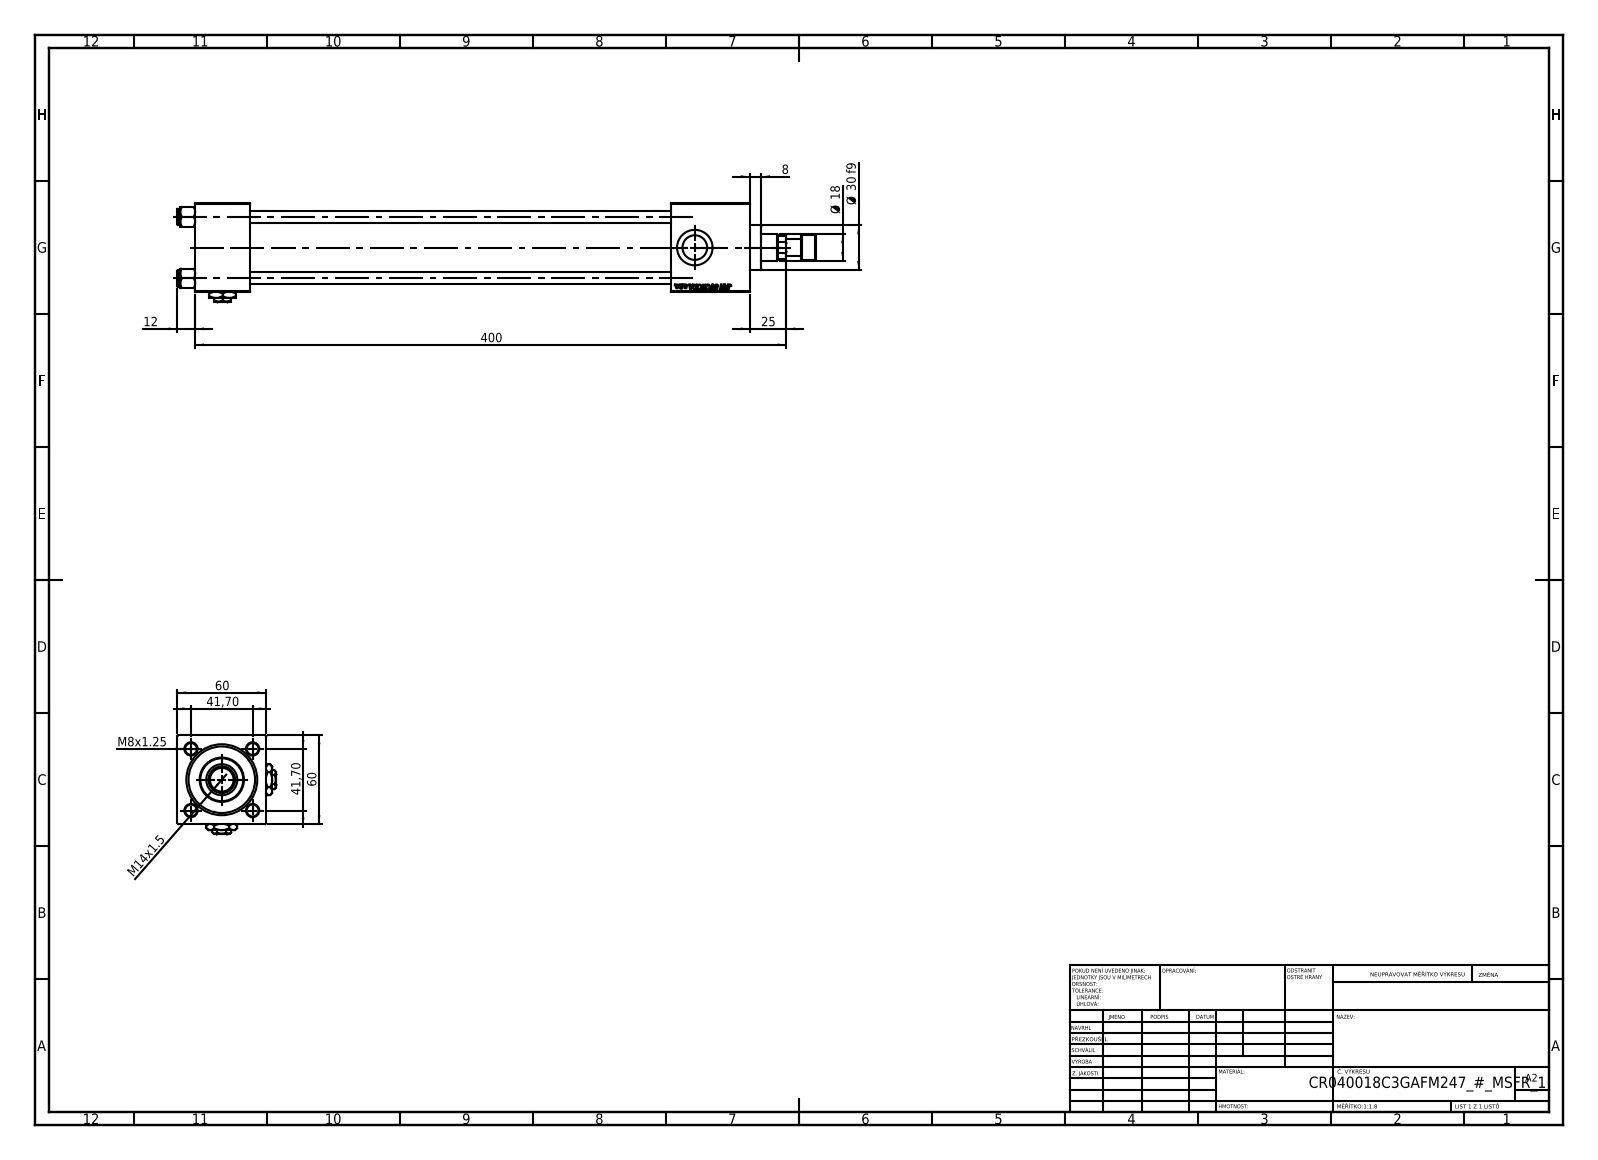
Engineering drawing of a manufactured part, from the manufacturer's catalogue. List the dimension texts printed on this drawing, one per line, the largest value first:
400
60
60
41,70
41,70
Ø 30 f9
25
Ø 18
M14x1.5
12
8
M8x1.25
